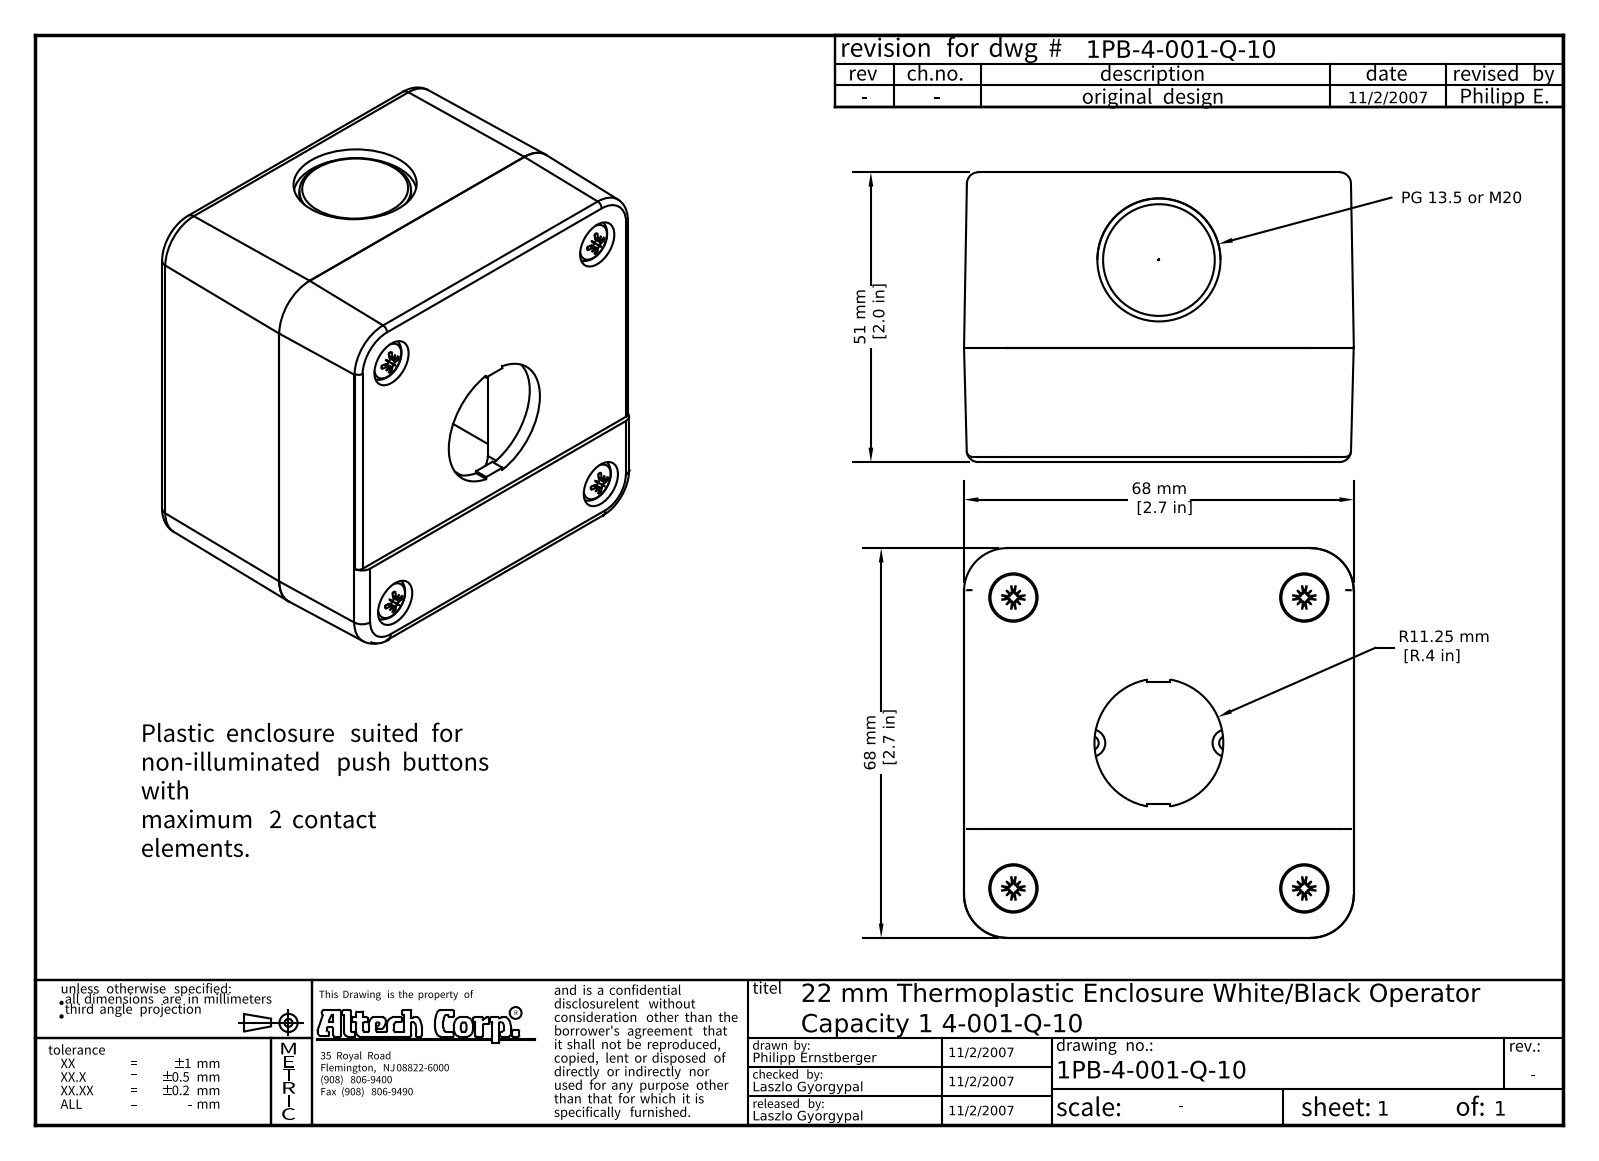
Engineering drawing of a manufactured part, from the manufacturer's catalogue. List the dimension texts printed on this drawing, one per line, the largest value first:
68 mm [2.7 in]
68 mm [2.7 in]
51 mm [2.0 in]
PG 13.5 or M20
R11.25 mm [R.4 in]
